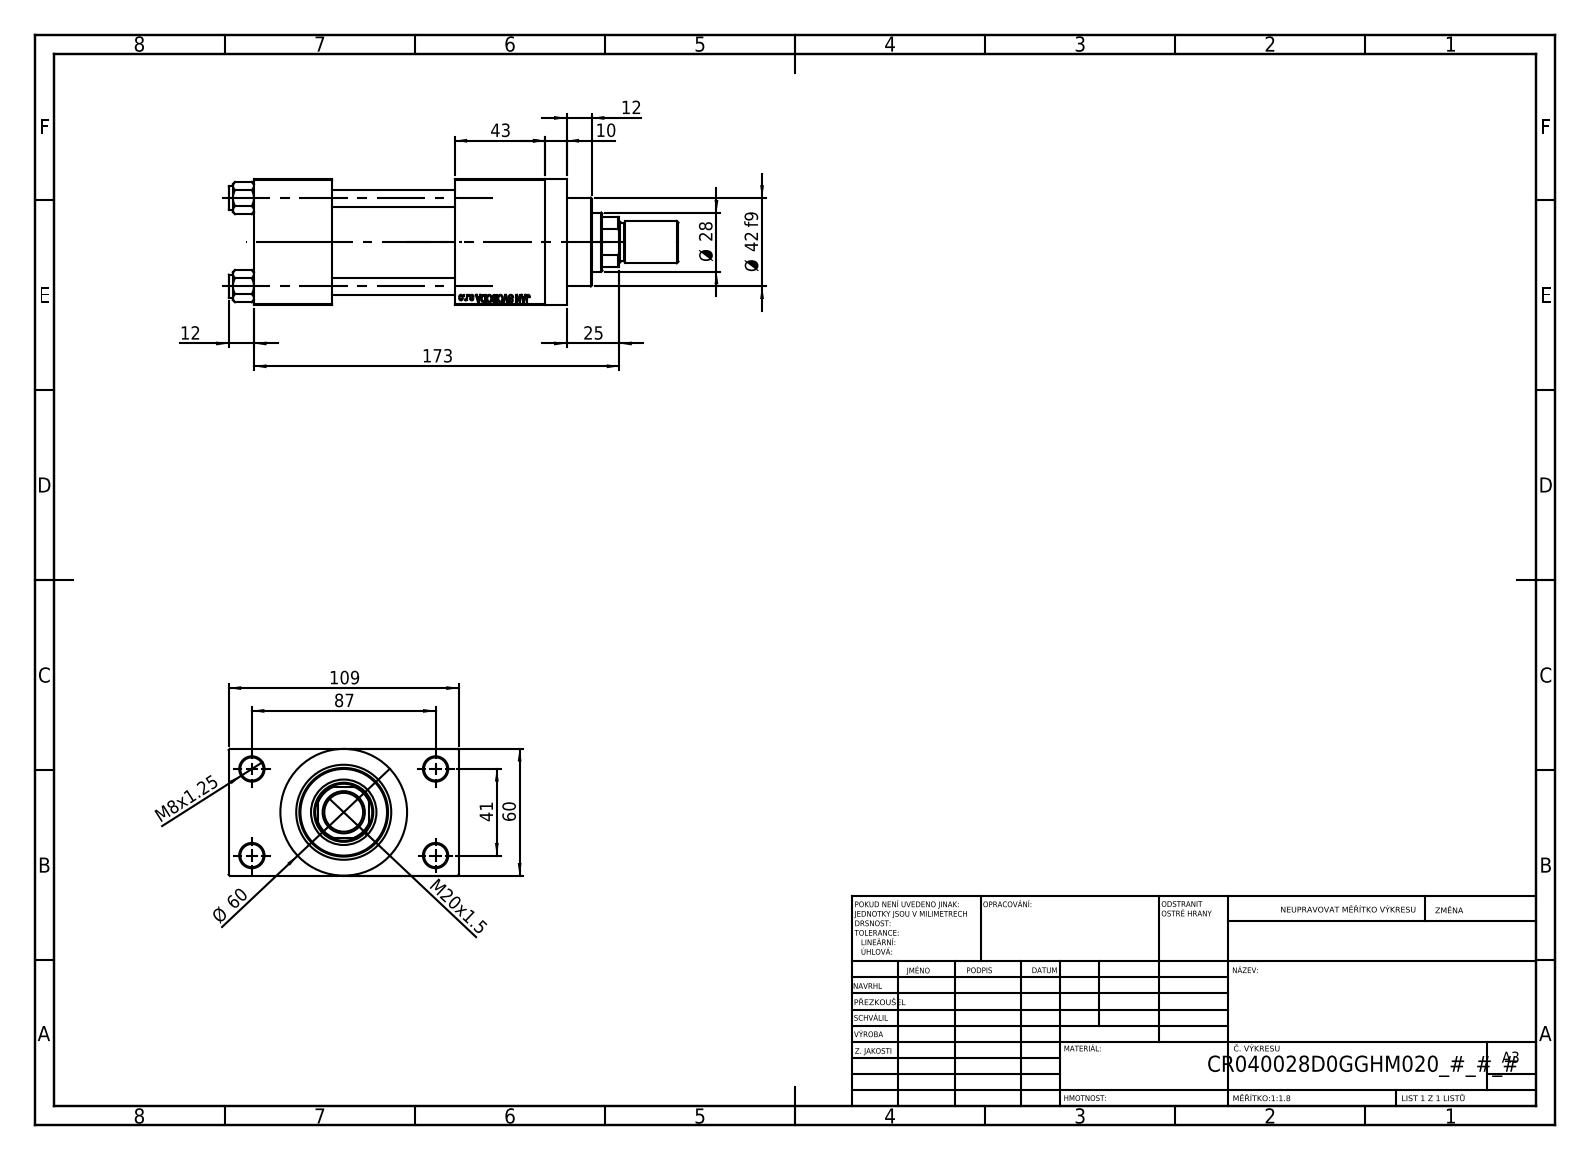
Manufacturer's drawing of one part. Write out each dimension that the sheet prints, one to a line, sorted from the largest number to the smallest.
173
109
87
Ø 60
60
43
Ø 42 f9
41
Ø 28
25
M20x1.5
12
12
10
M8x1.25
